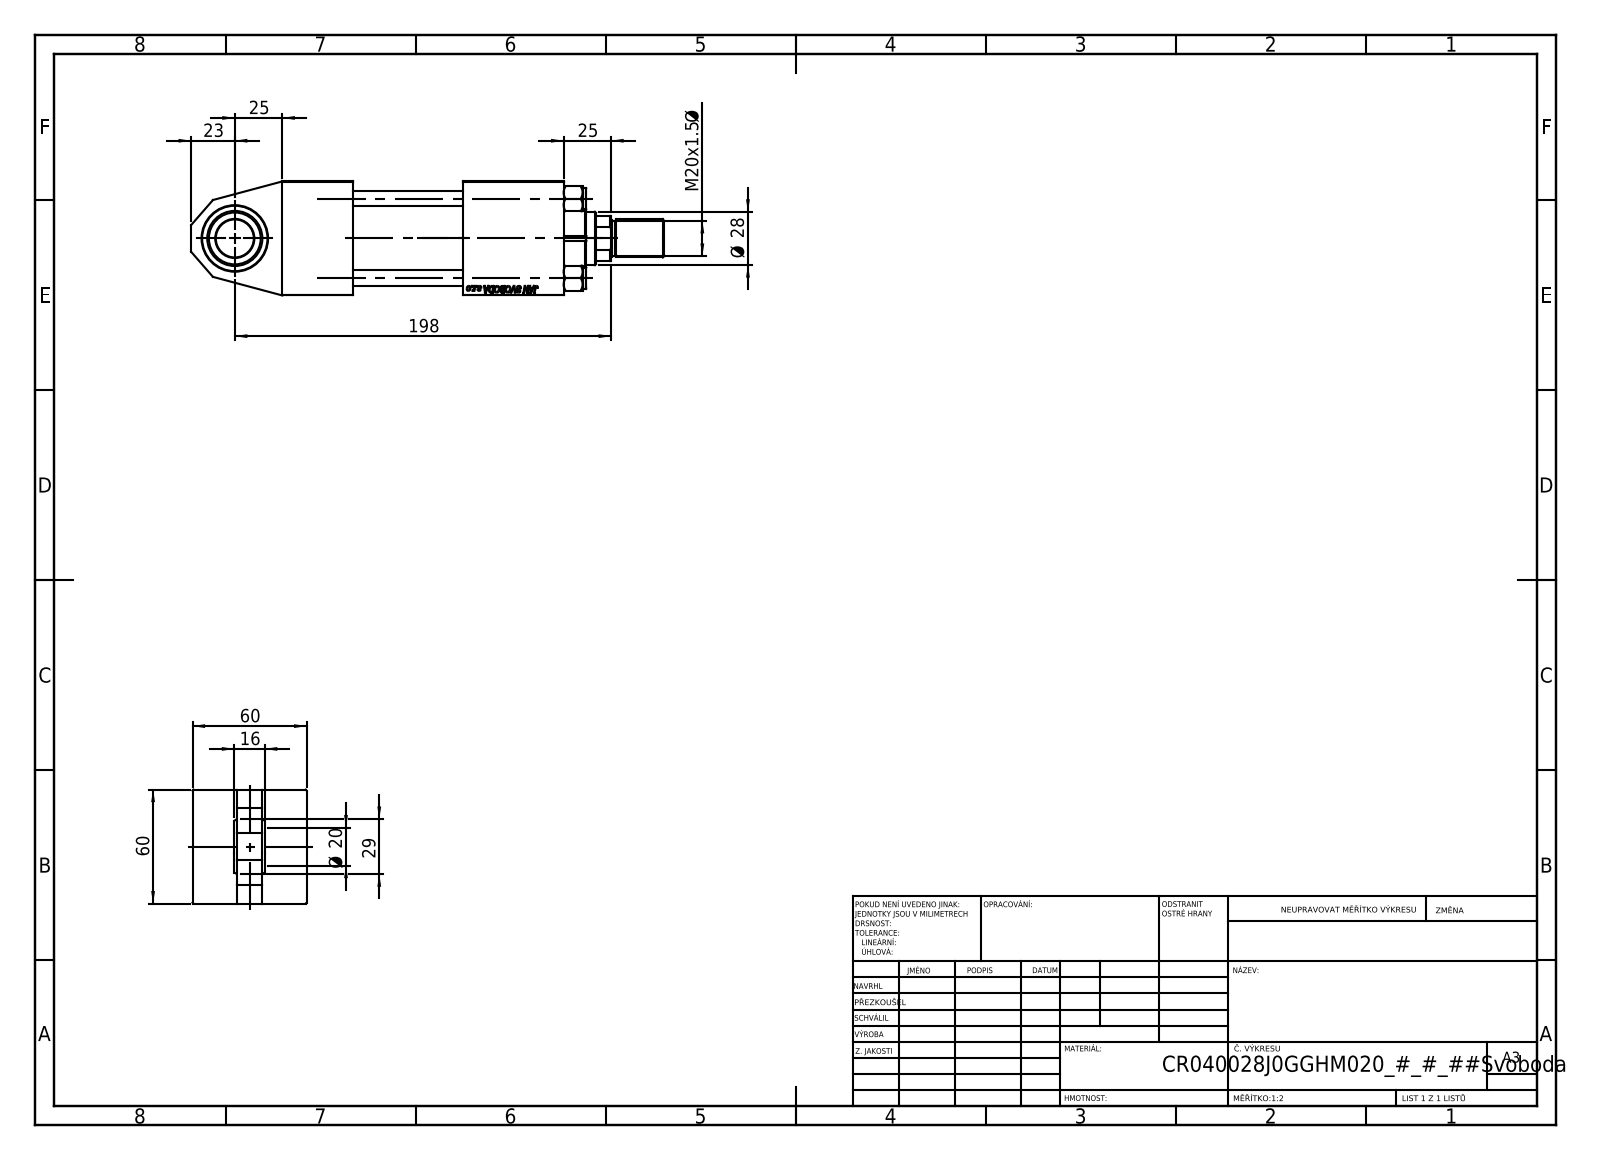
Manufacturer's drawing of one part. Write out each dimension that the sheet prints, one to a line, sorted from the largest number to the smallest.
198
60
60
29
Ø 28
25
25
23
M20x1.5 Ø
Ø 20
16
